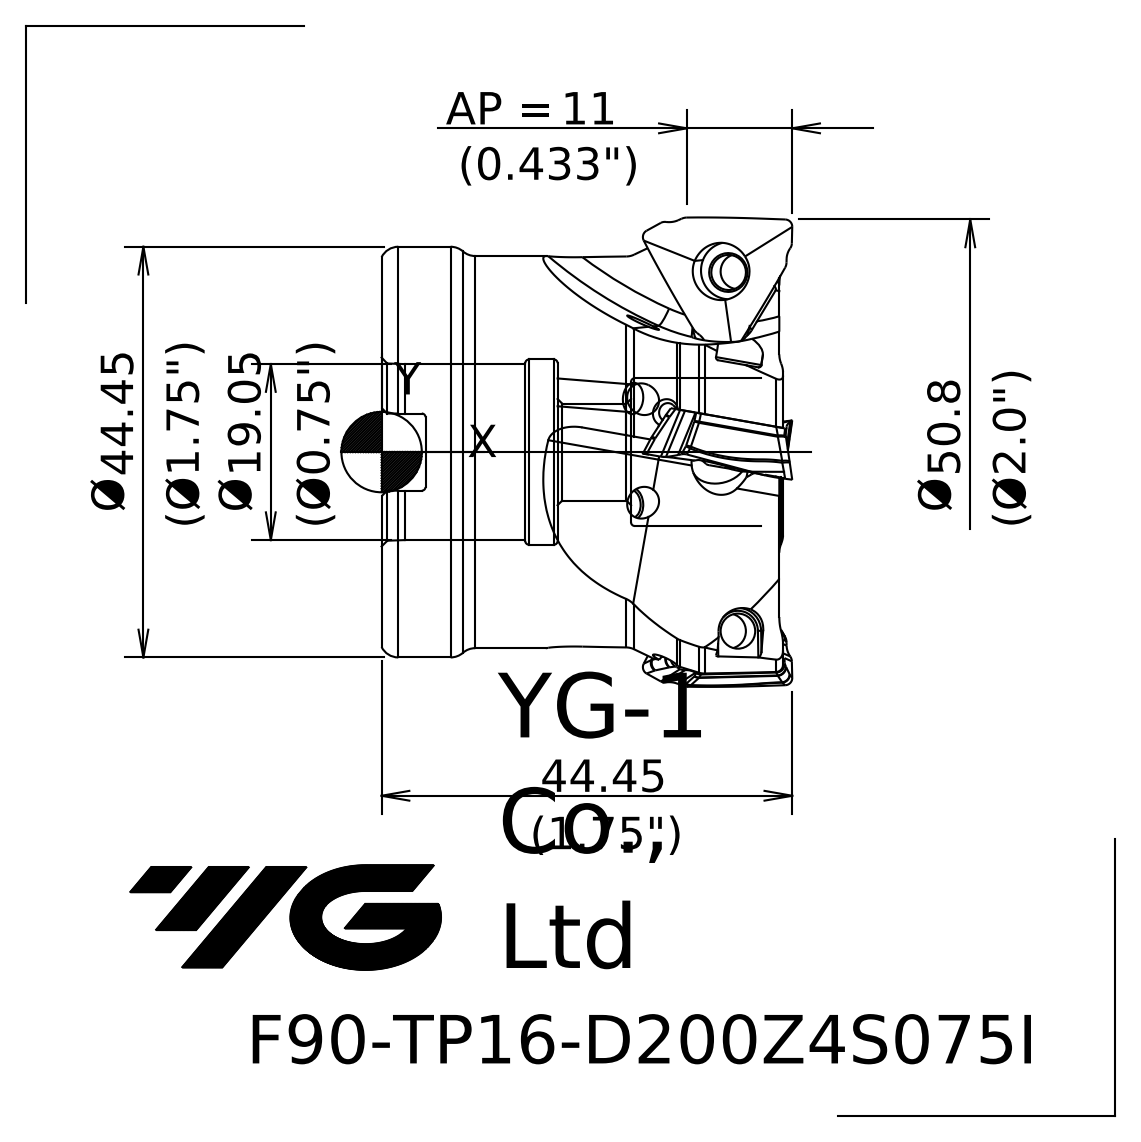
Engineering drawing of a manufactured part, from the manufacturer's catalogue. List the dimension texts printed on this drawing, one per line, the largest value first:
50.8 Ø
44.45
19.05 Ø
11 AP =
